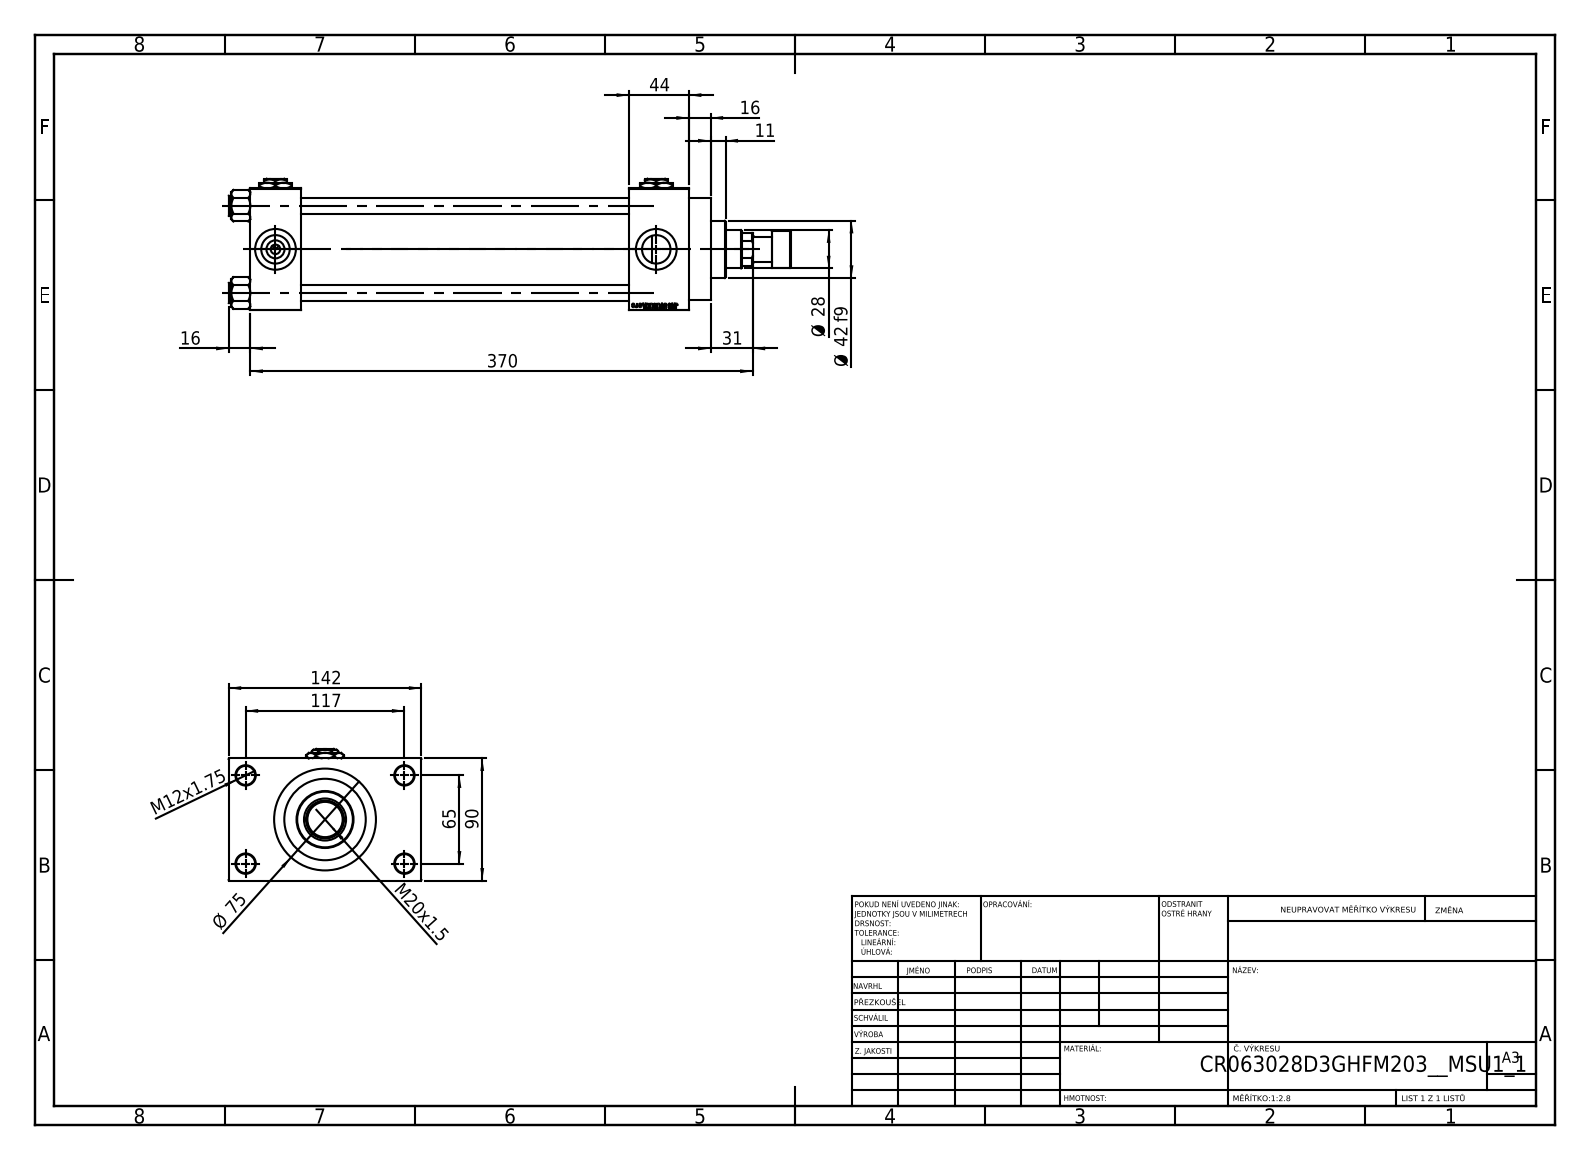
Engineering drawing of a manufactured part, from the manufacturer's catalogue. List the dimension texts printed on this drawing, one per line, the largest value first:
370
142
117
90
Ø 75
65
44
Ø 42 f9
31
Ø 28
M20x1.5
16
16
M12x1.75
11
